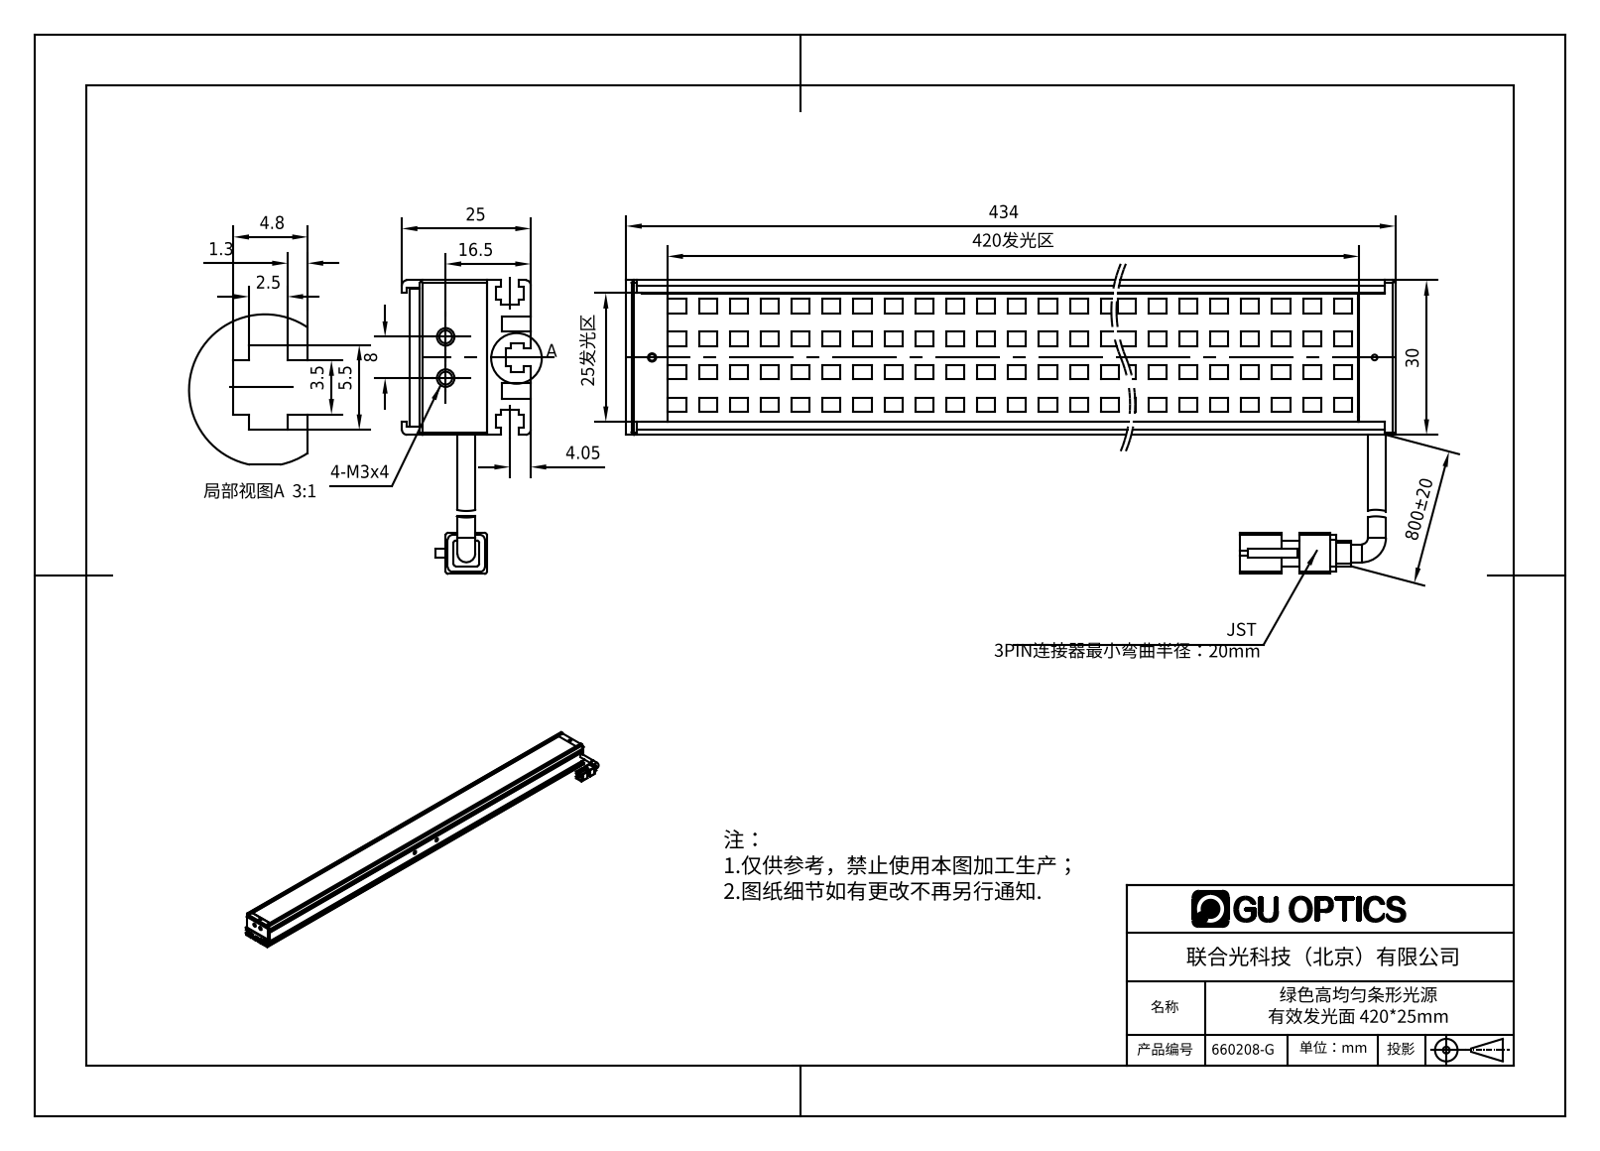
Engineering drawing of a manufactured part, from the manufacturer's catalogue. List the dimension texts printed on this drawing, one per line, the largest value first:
800±20
434
420发光区
30
25发光区
25
16.5
8
5.5
4.8
4.05
3.5
2.5
1.3
